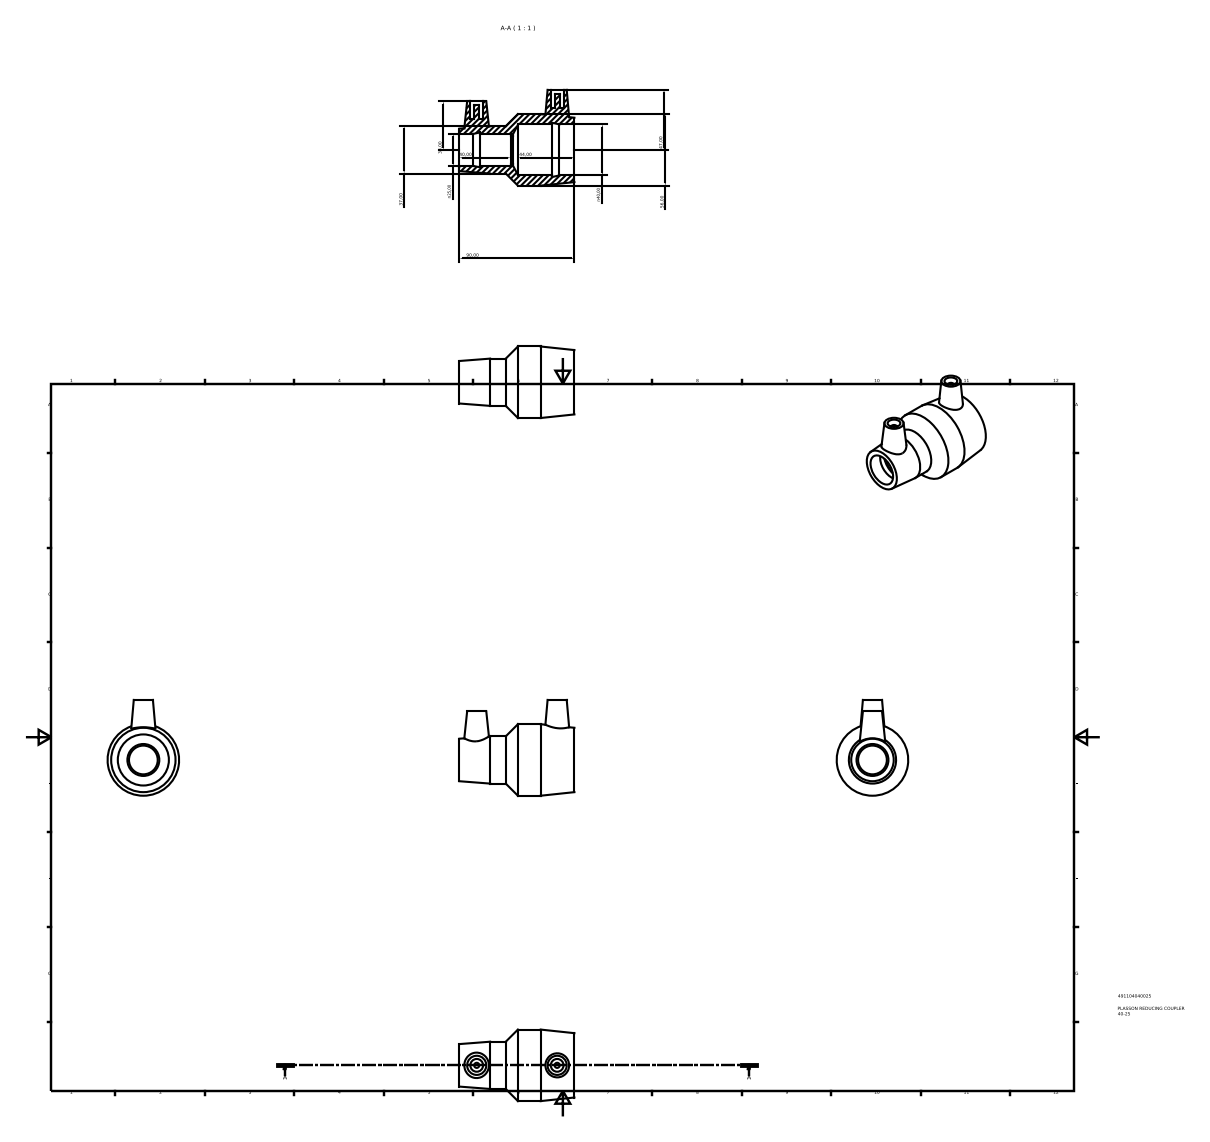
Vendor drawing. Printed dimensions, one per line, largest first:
90,00
56,00
47,00
44,00
n40,00
40,00
38,00
37,00
n25,00
